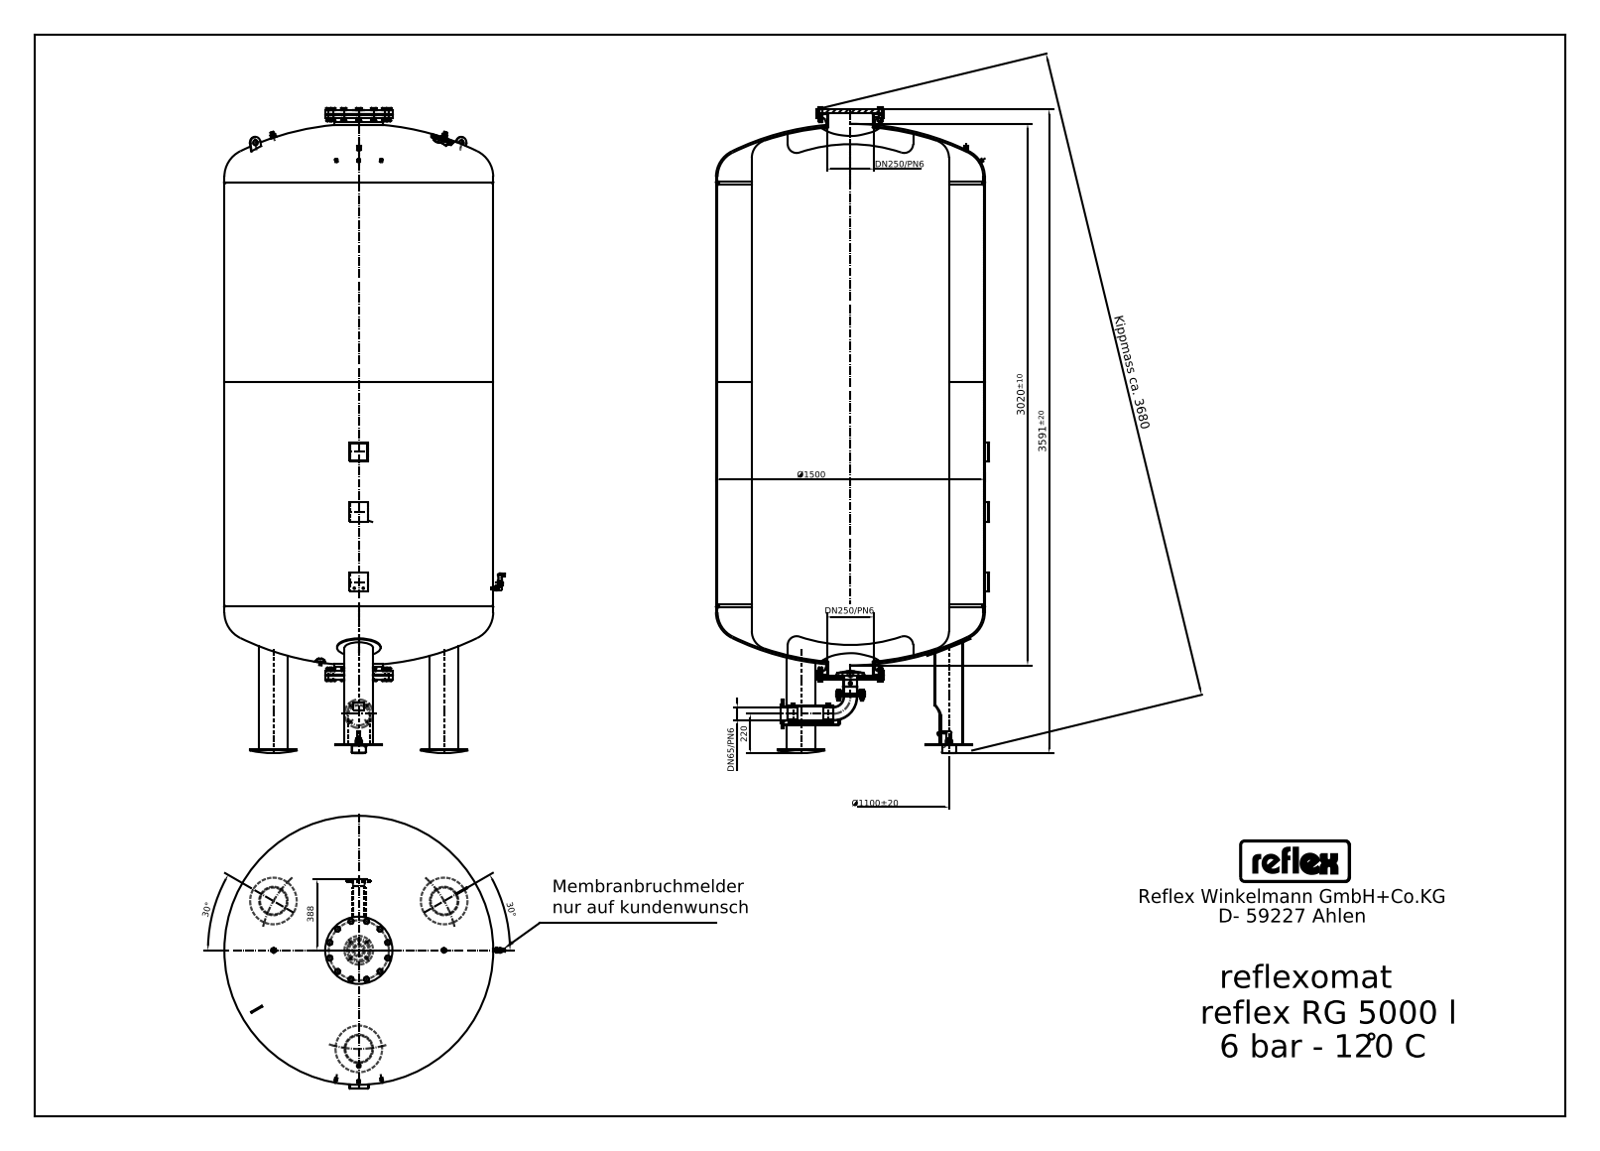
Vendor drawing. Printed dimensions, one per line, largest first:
Kippmass ca. 3680
3591±20
3020±10
Ø1500
Ø1100±20
388
DN250/PN6
DN250/PN6
220
DN65/PN6
30°
30°
